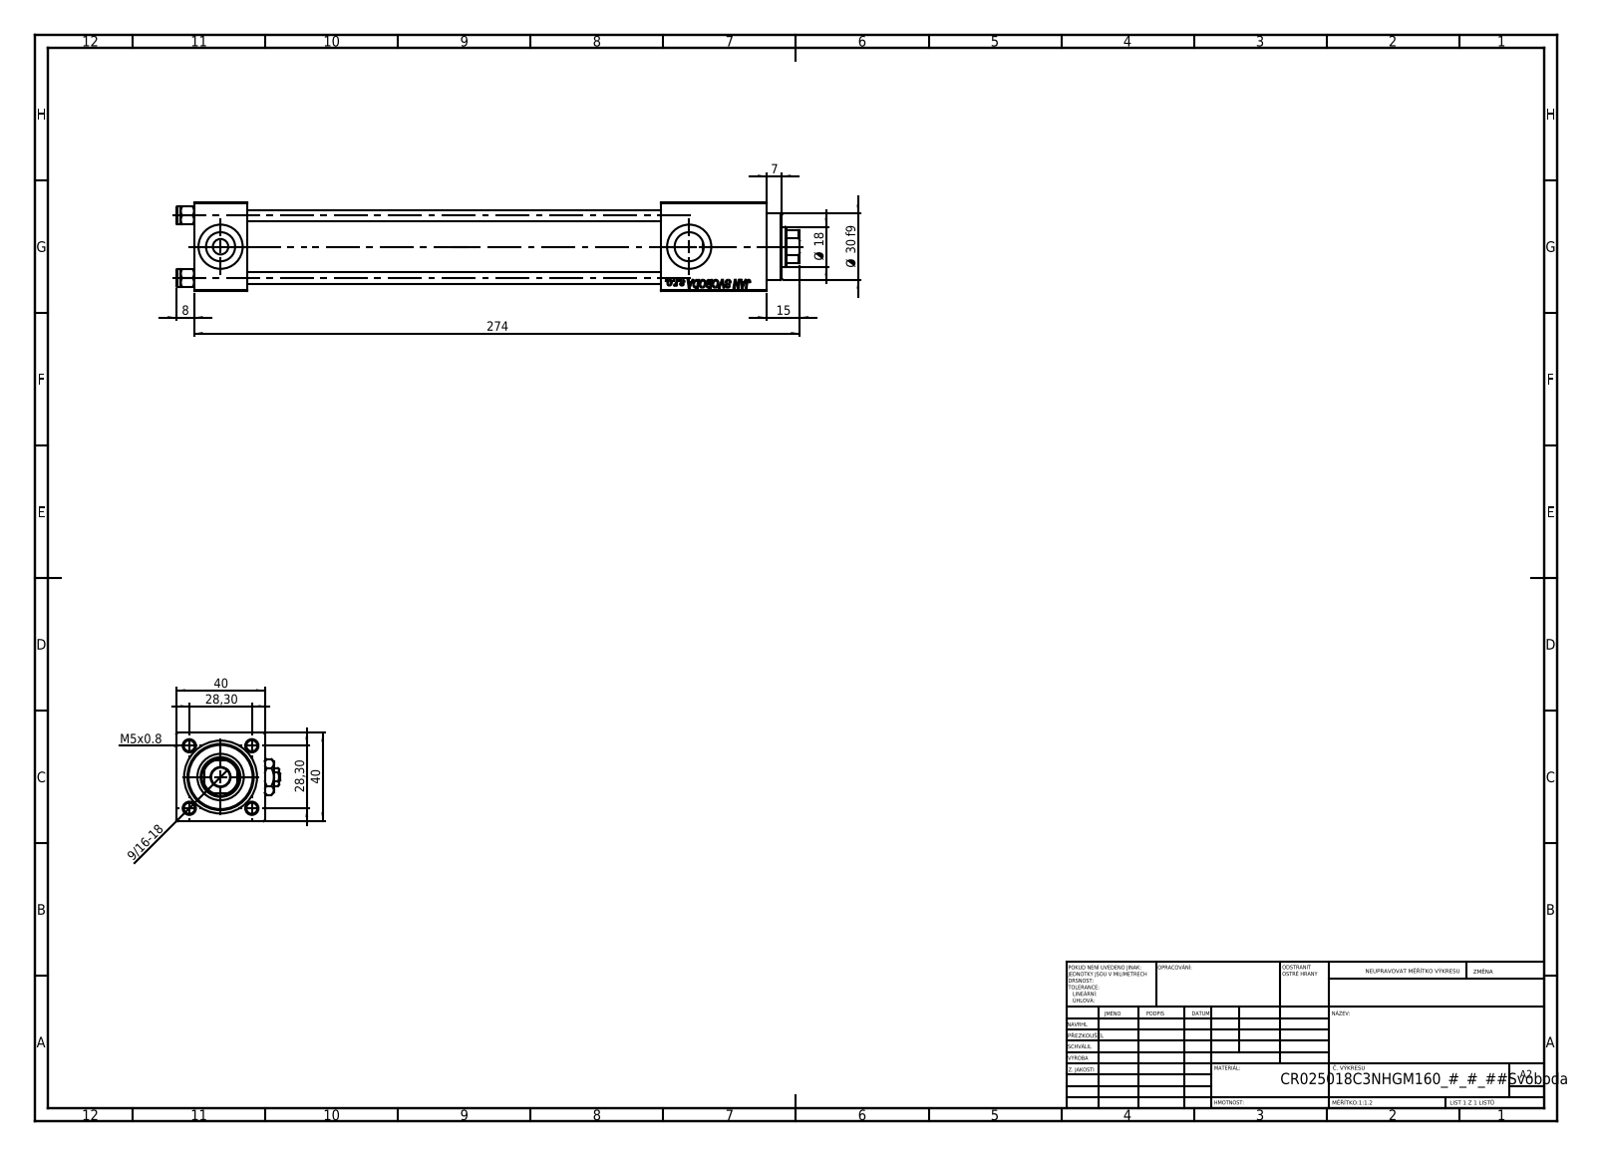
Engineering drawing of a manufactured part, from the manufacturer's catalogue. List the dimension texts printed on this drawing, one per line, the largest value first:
274
40
40
Ø 30 f9
28,30
28,30
Ø 18
15
8
7
M5x0.8
9/16-18
